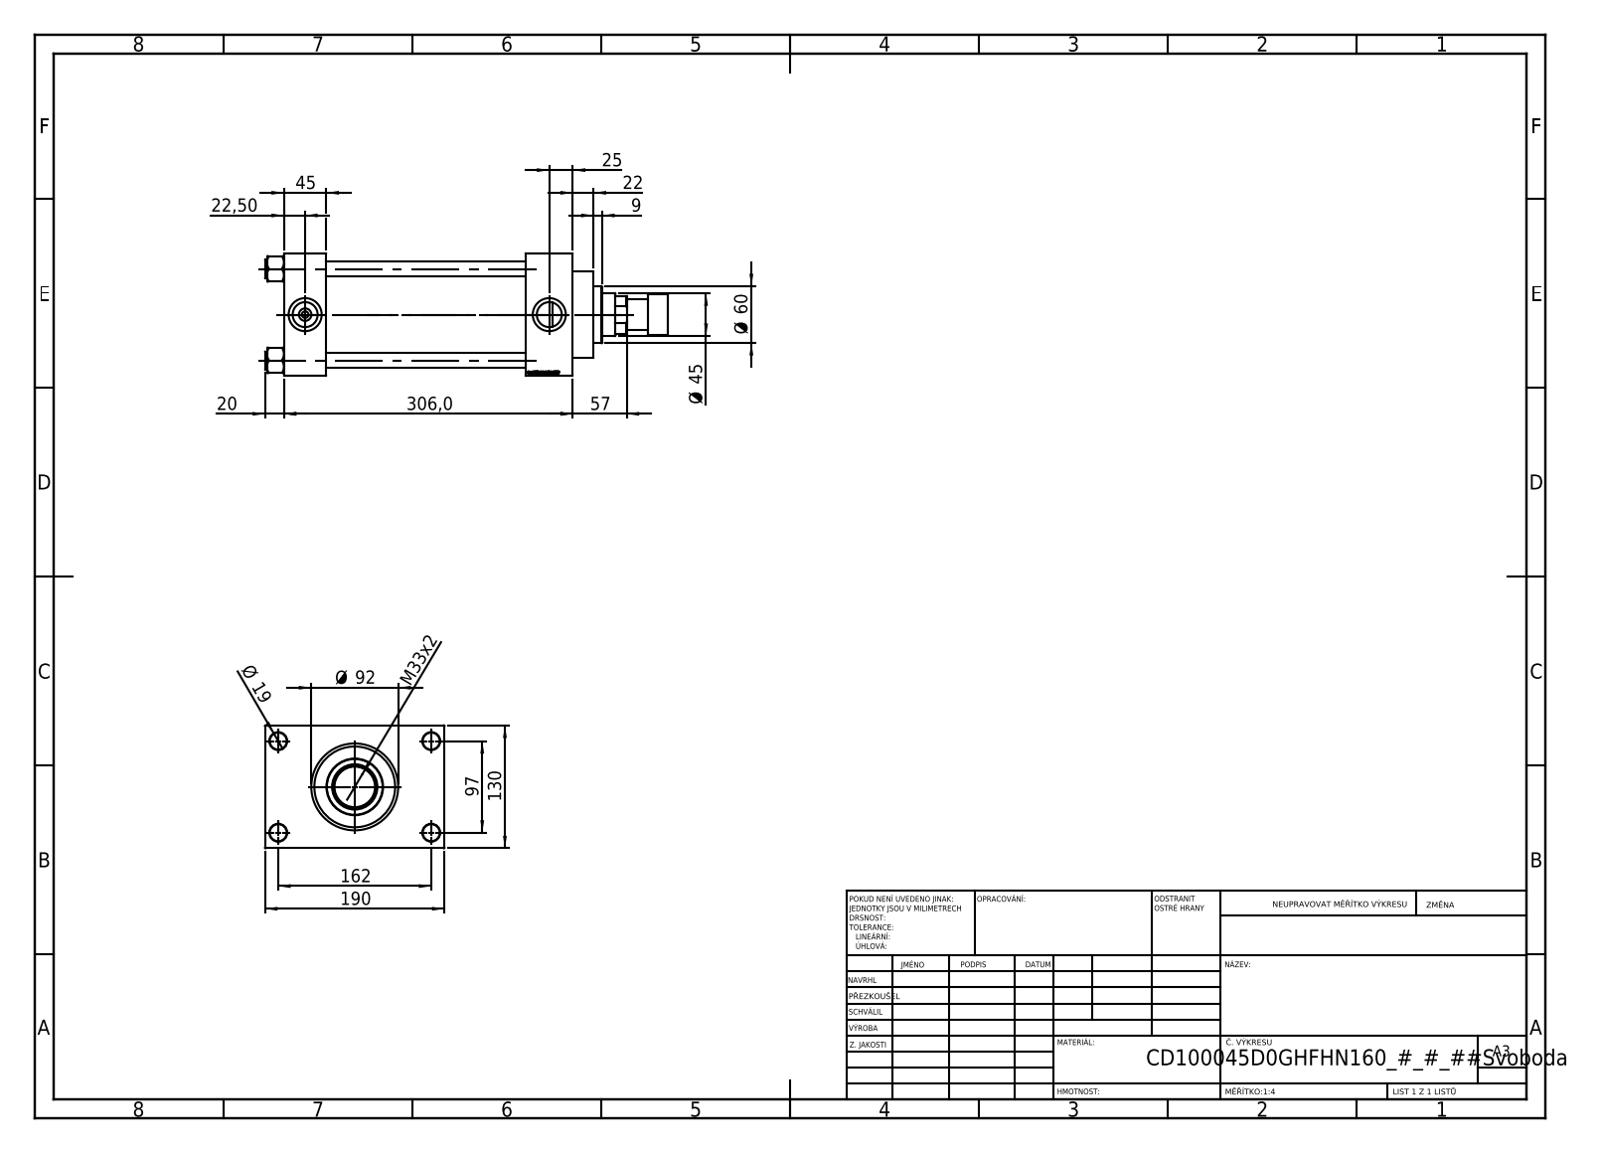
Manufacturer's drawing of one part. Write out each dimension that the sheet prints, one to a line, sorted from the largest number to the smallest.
306,0
190
162
130
97
Ø 92
Ø 60
57
Ø 45
45
M33x2
25
22,50
22
20
Ø 19
9
